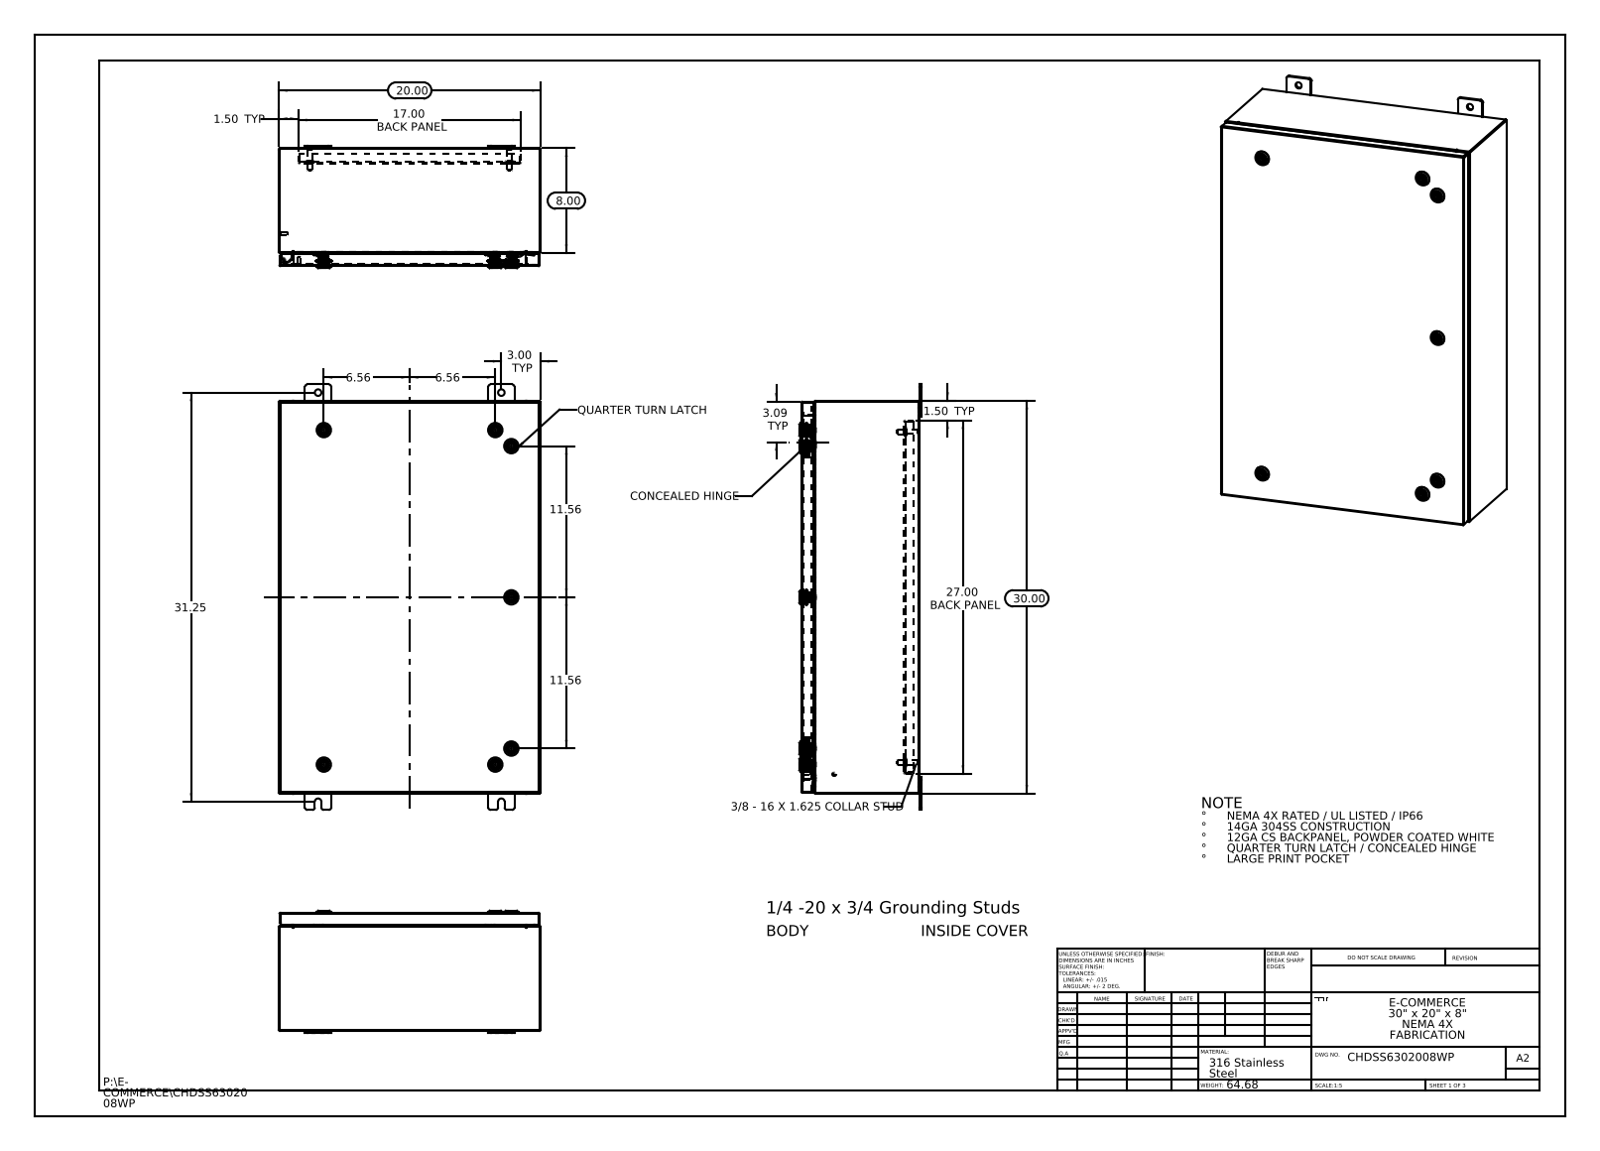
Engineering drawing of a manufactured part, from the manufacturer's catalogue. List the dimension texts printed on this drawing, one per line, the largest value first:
31.25
30.00
27.00 BACK PANEL
20.00
17.00 BACK PANEL
11.56
11.56
8.00
6.56
6.56
3.09 TYP
3.00 TYP
1.50 TYP
1.50 TYP
